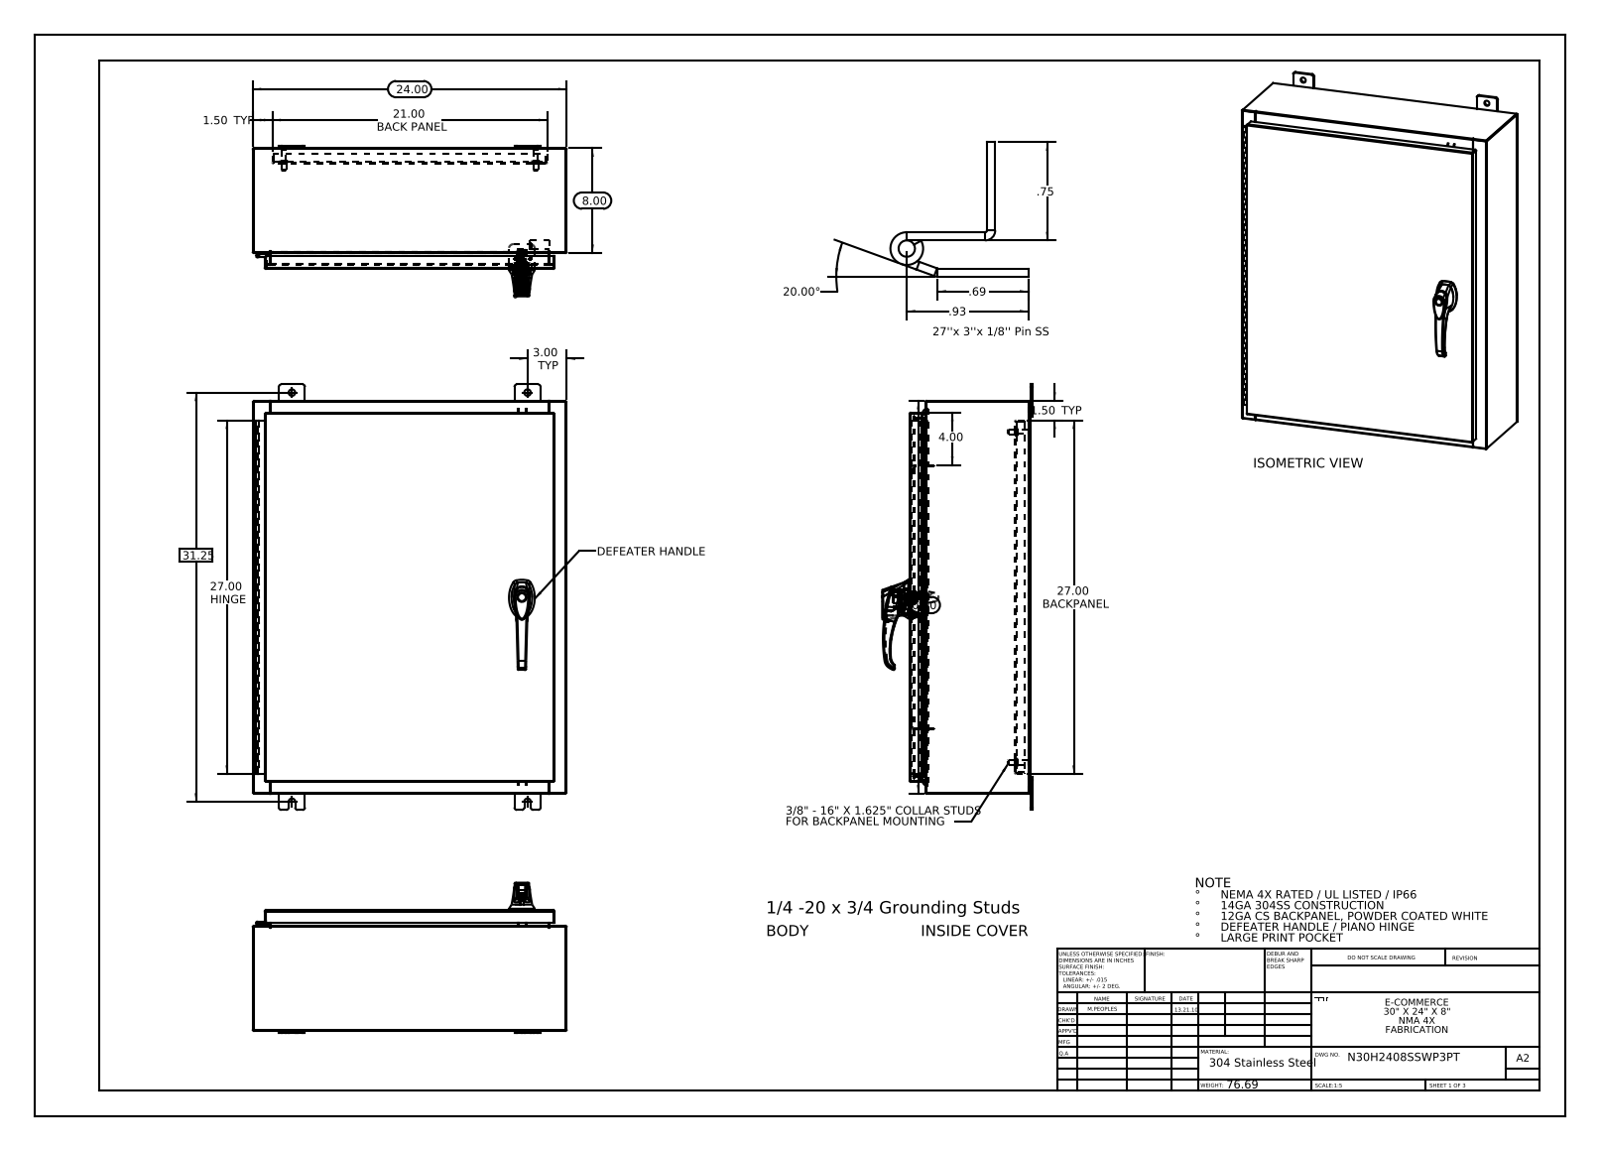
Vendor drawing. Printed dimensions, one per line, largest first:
31.25
30.00
27.00 HINGE
27.00 BACKPANEL
24.00
21.00 BACK PANEL
20.00°
8.00
4.00
3.00 TYP
1.50 TYP
1.50 TYP
.93
.75
.69
